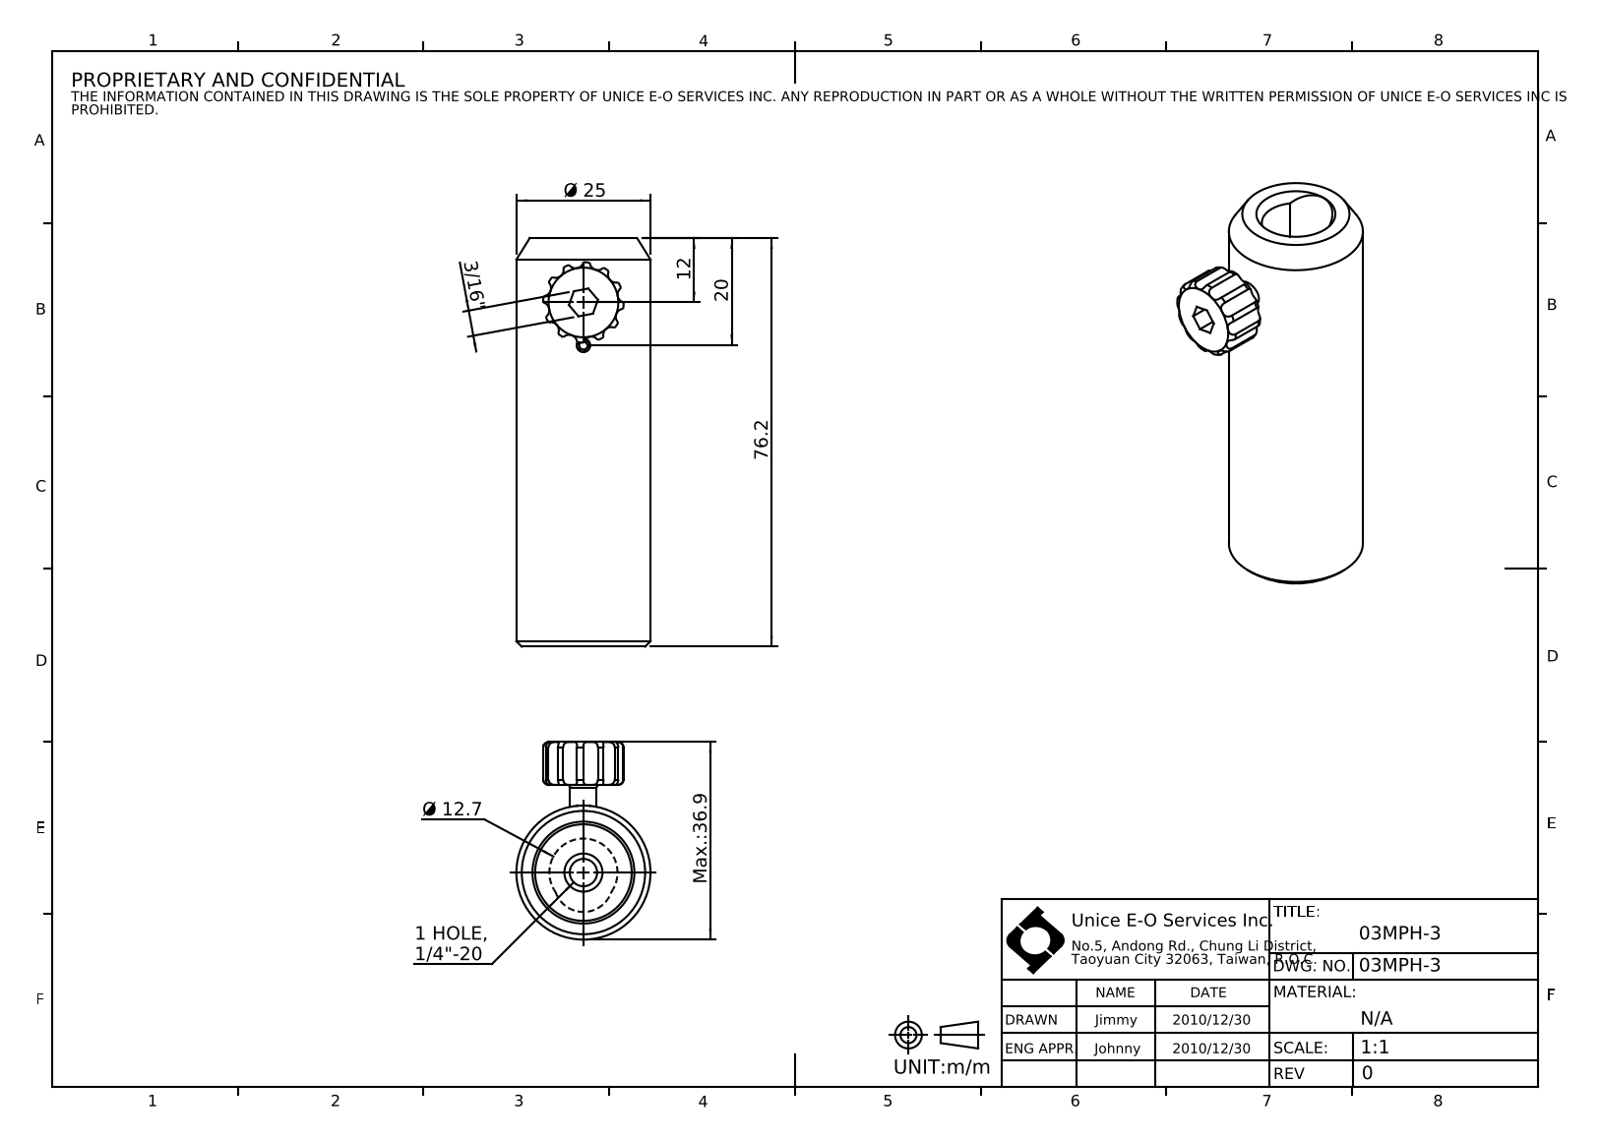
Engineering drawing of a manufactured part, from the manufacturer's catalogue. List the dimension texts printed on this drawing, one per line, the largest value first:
76.2
Max.: 36.9
Ø 25
20
Ø 12.7
12
1 HOLE, 1/4"-20
3/16"
